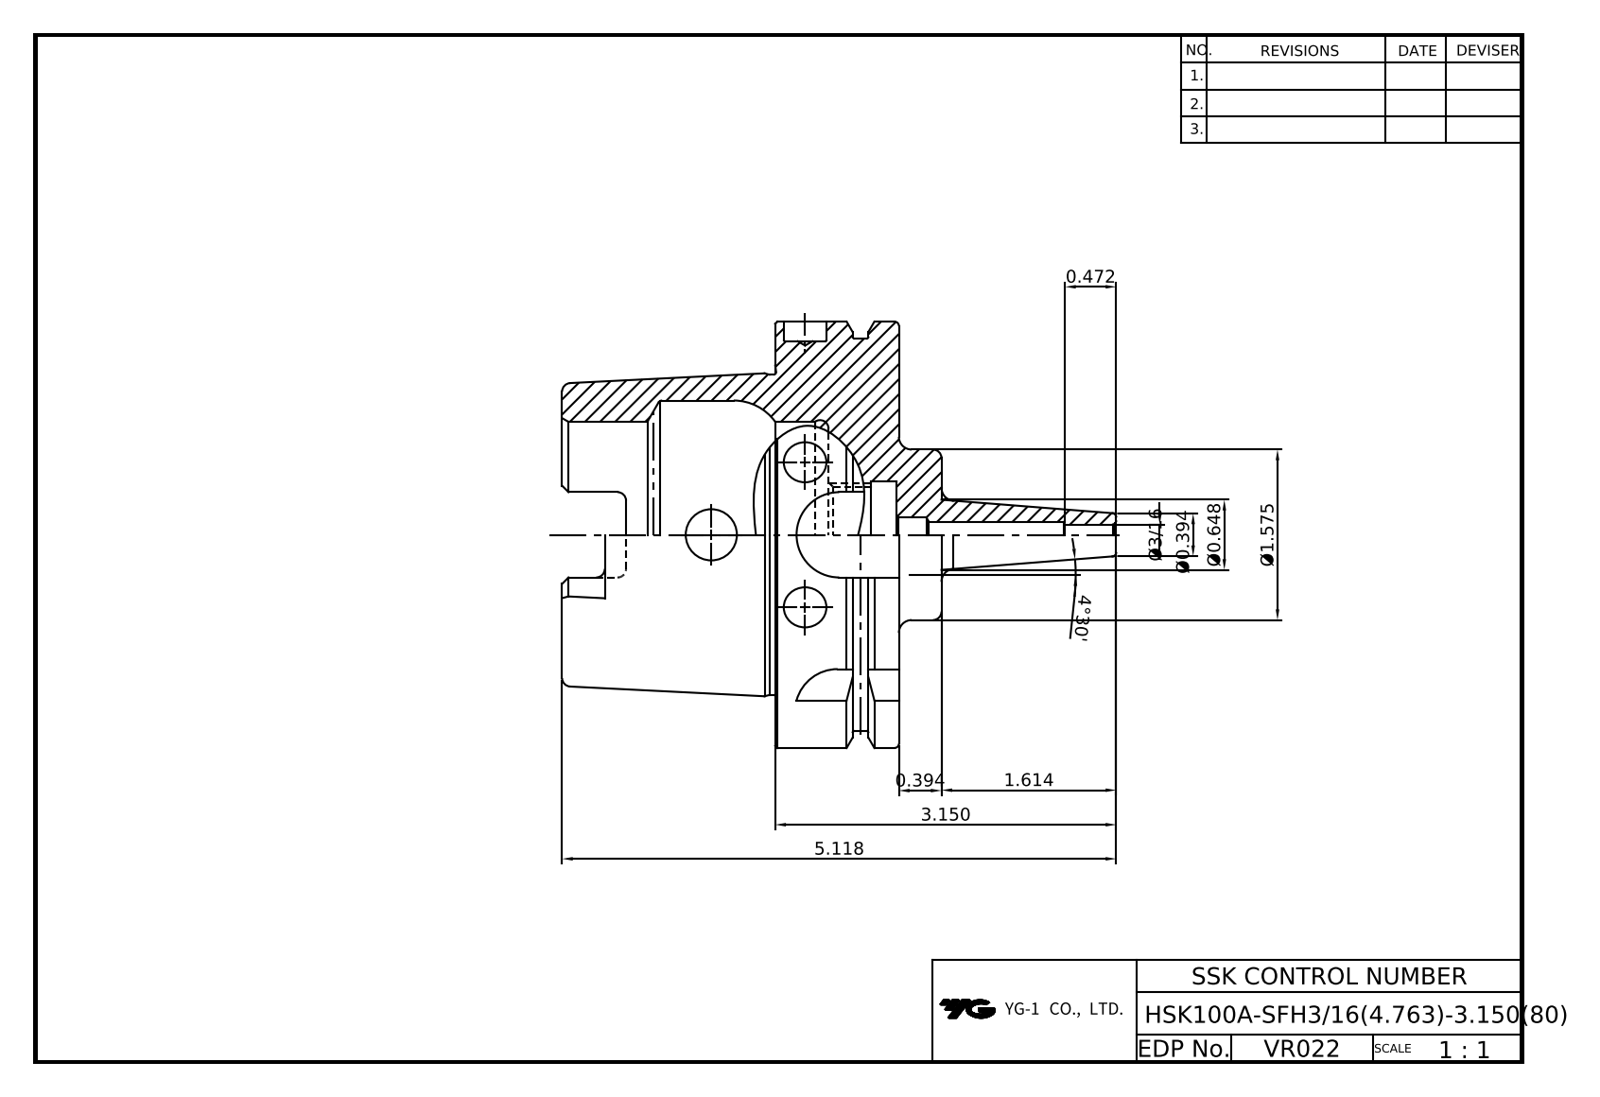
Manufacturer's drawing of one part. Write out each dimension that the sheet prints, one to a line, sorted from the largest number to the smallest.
5.118
4°30'
3.150
1.614
Ø1.575
Ø0.648
0.472
0.394
Ø0.394
